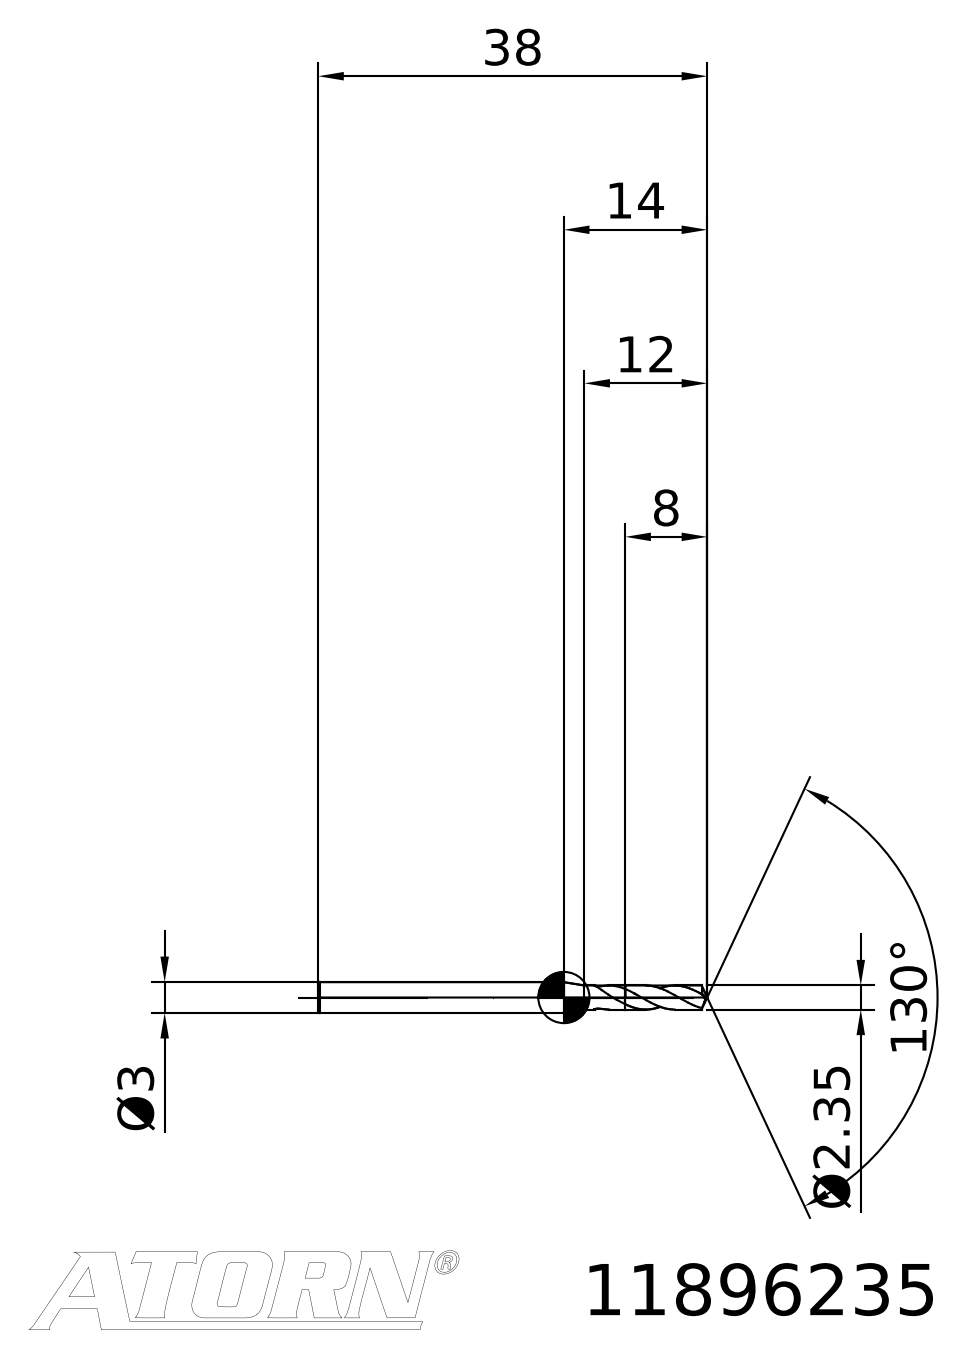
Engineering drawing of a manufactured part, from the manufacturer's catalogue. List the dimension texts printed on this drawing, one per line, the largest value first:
130°
38
14
12
8
Ø3
Ø2.35
